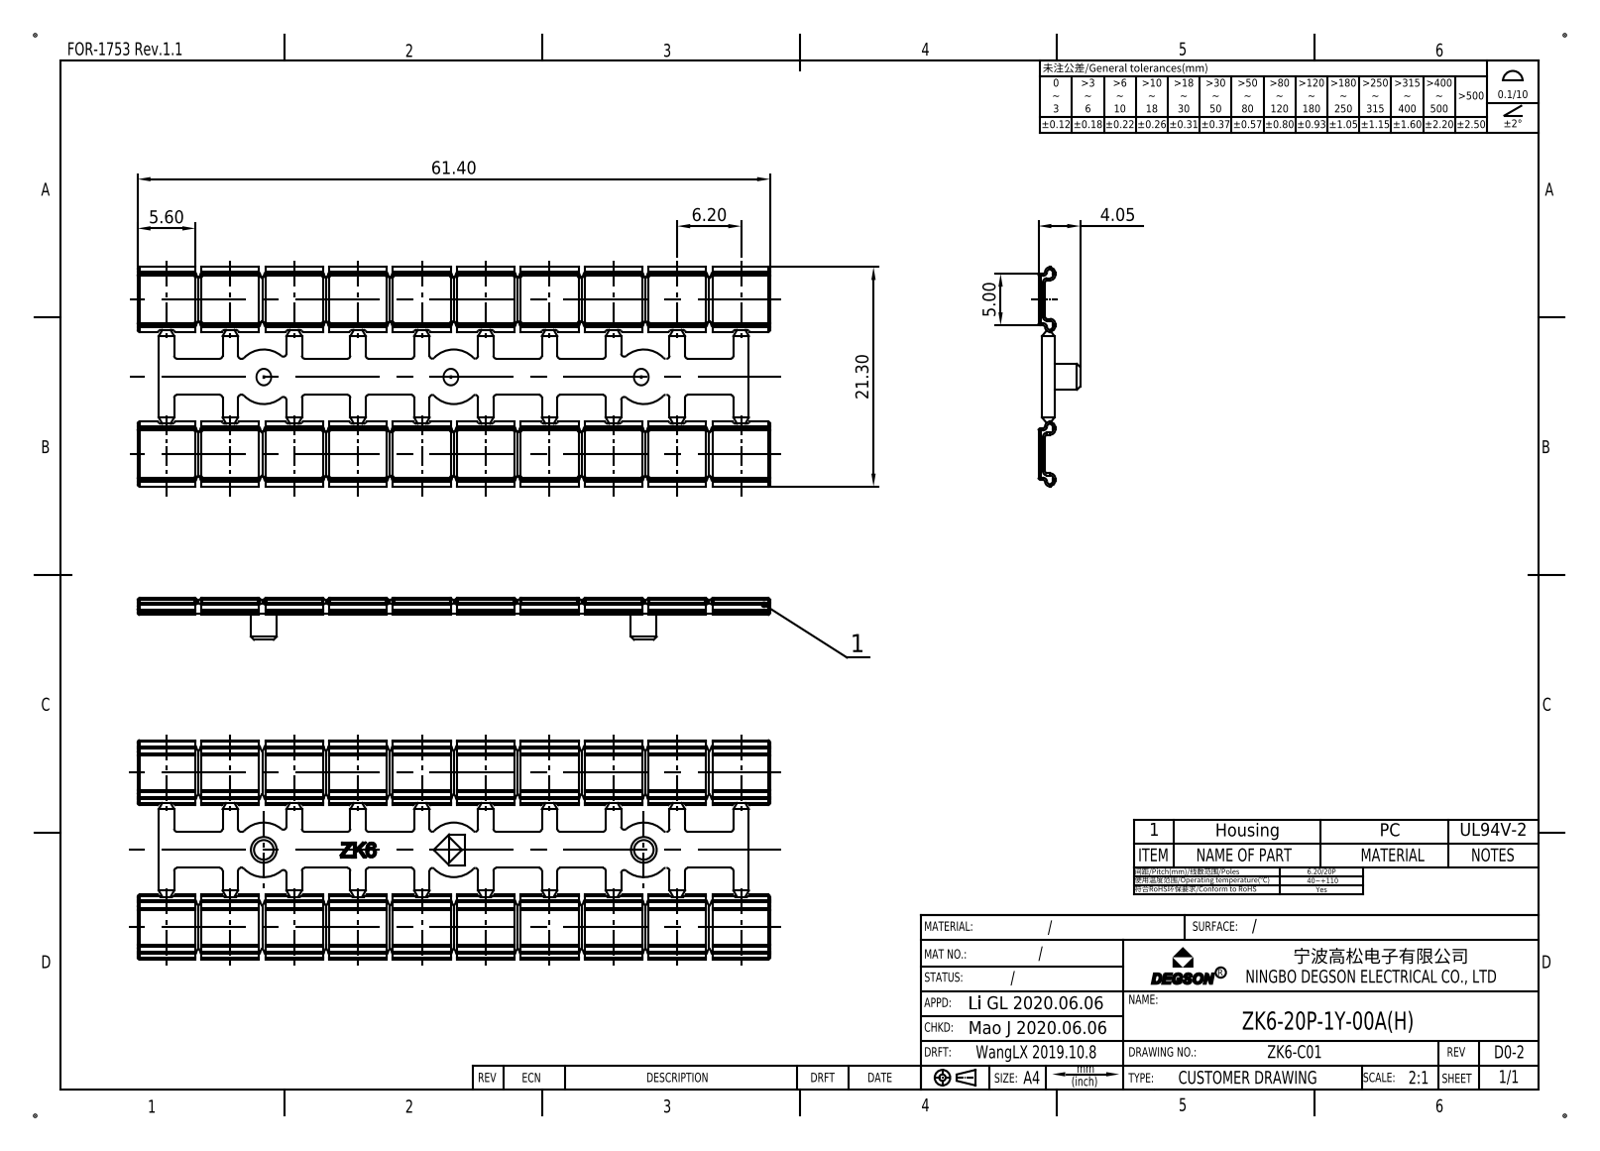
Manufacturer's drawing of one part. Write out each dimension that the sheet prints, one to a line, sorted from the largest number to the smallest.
61.40
21.30
6.20
5.60
5.00
4.05
